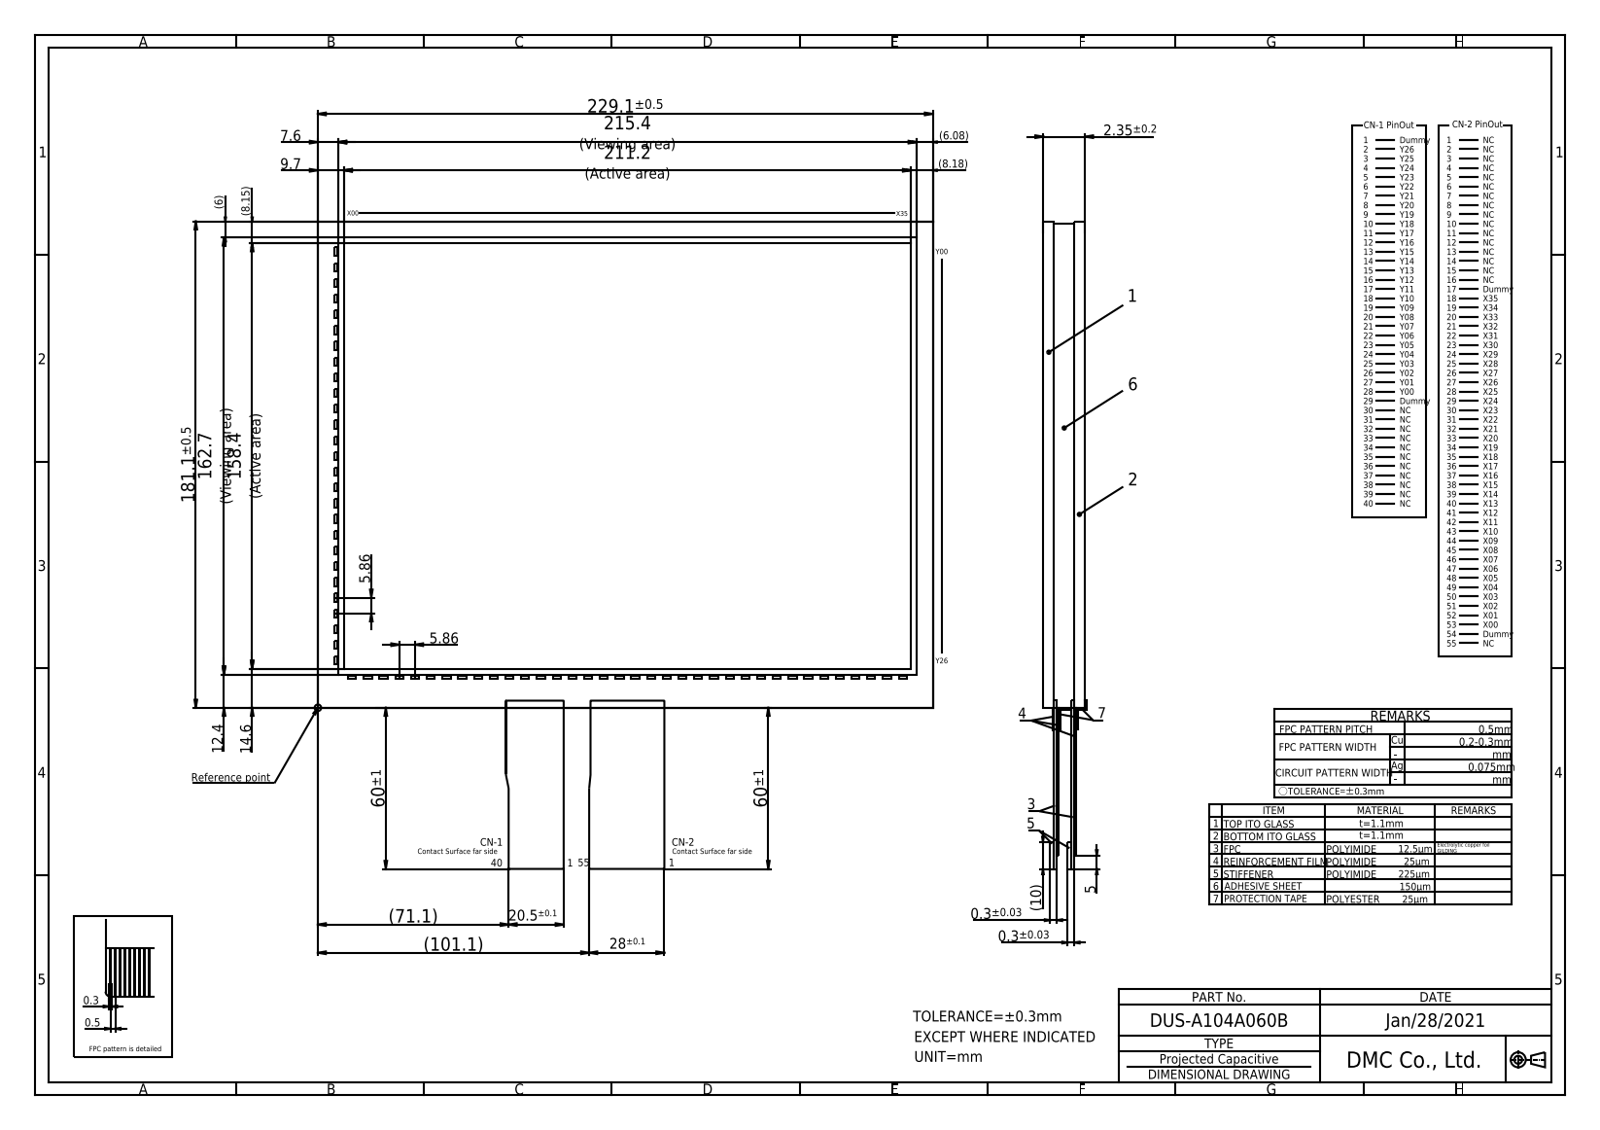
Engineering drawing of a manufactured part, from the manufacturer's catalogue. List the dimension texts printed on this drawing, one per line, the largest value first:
229.1±0.5
215.4 (Viewing area)
211.2 (Active area)
181.1±0.5
162.7 (Viewing area)
158.4 (Active area)
(101.1)
(71.1)
60±1
60±1
28±0.1
20.5±0.1
14.6
12.4
(10)
9.7
(8.18)
(8.15)
7.6
(6.08)
(6)
5.86
5.86
5
2.35±0.2
0.5
0.3
0.3±0.03
0.3±0.03
